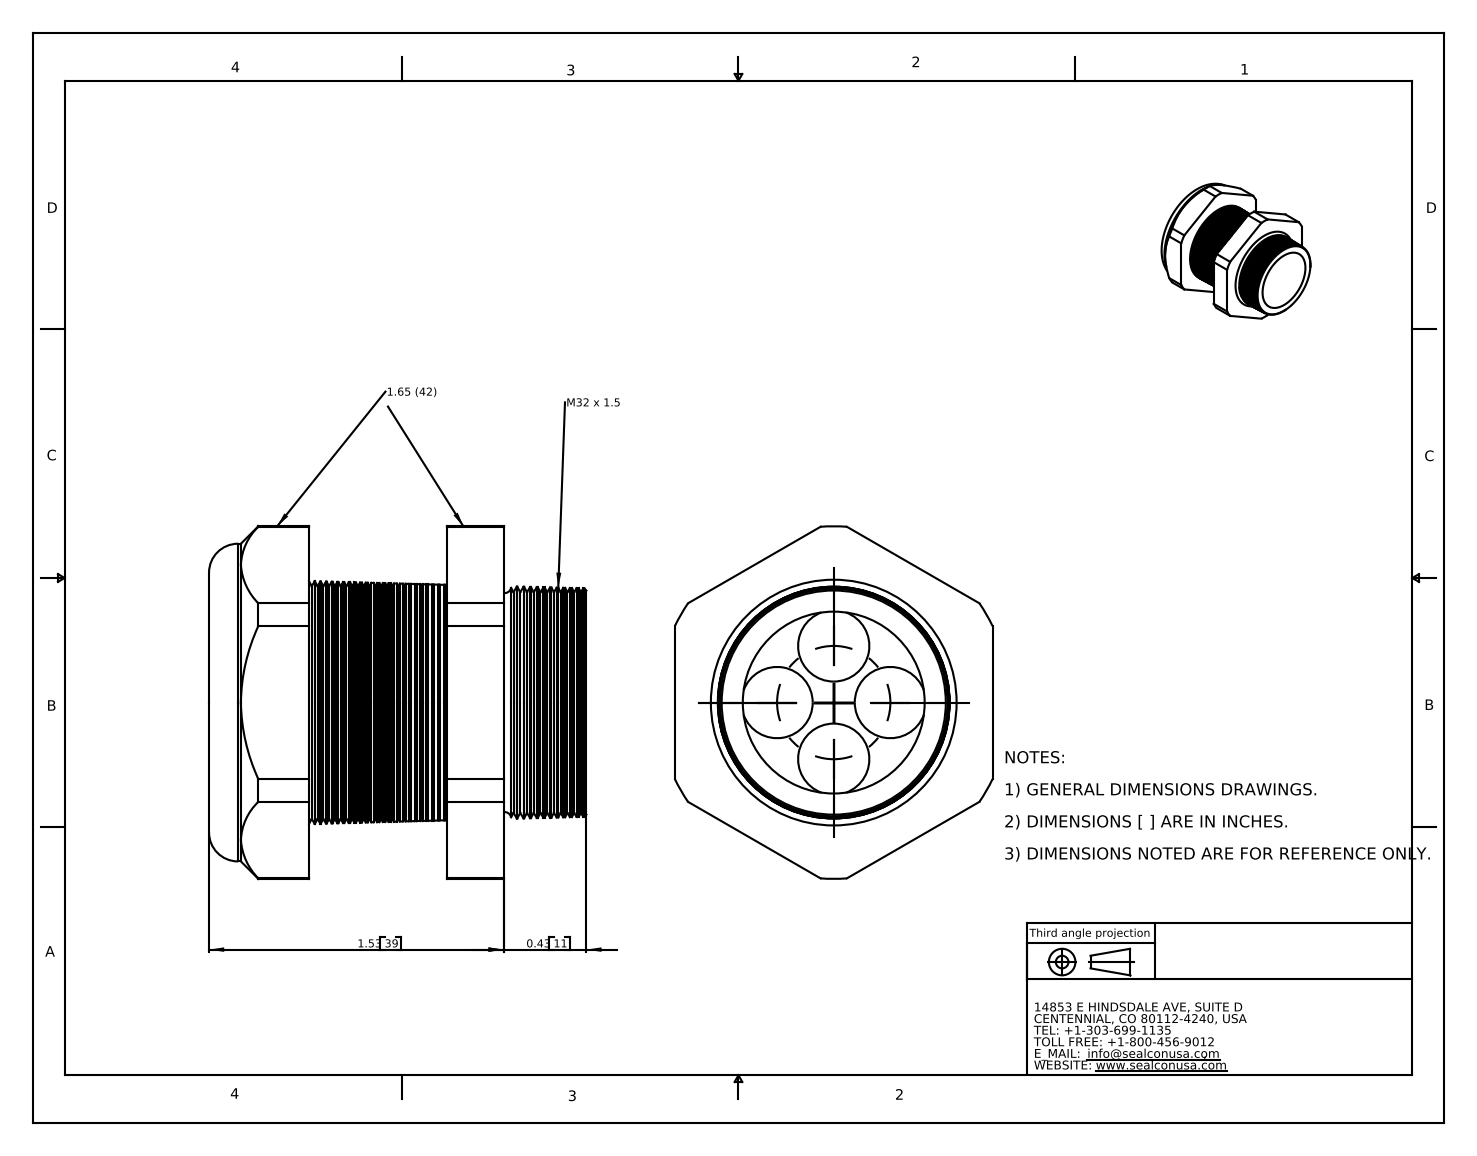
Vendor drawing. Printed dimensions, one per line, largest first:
1.53 39
0.43 11
